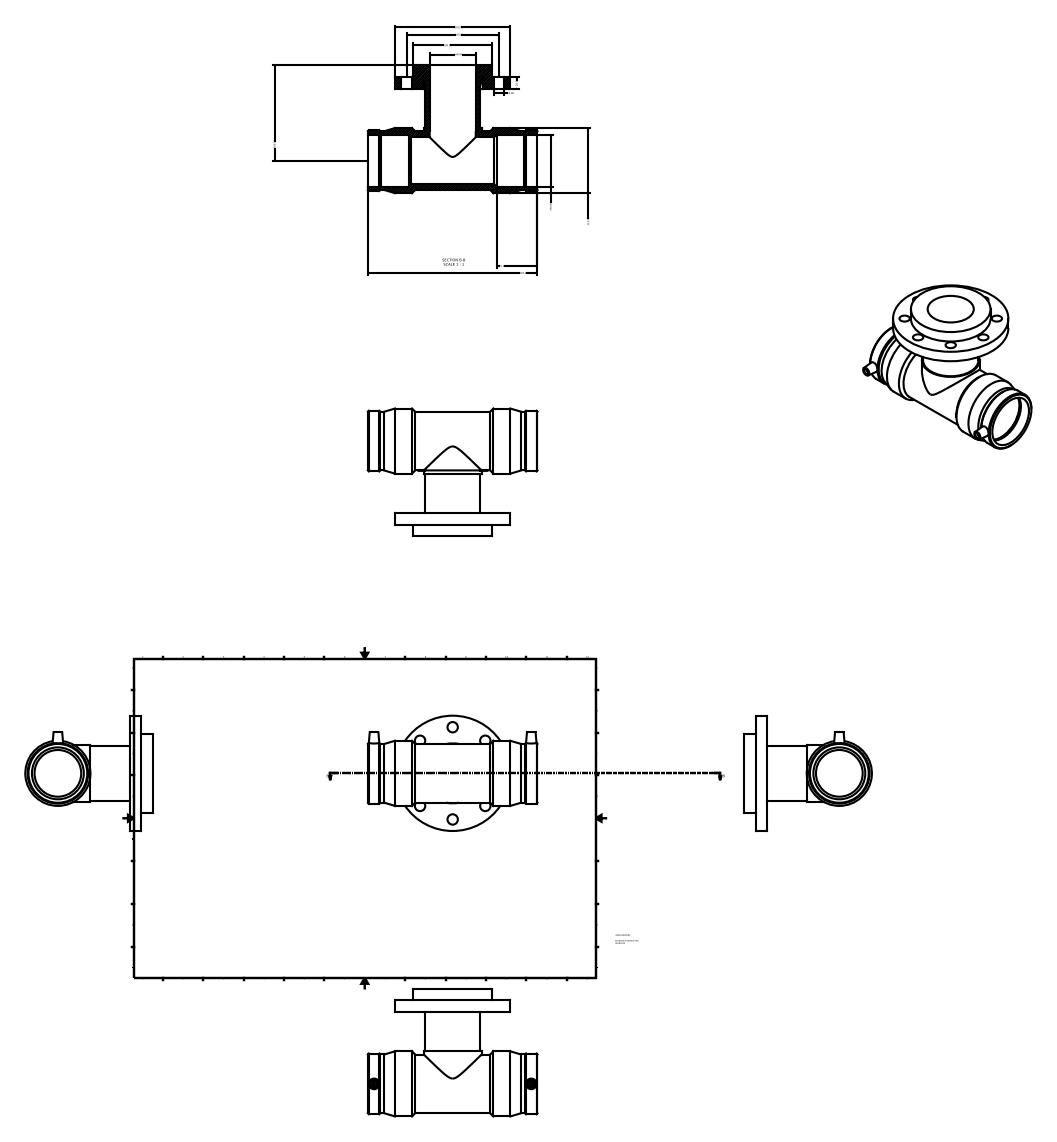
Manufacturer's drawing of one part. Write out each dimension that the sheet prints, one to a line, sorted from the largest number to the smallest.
294.00
200.00
165.00
160.00
138.00
113.00
n90.00
n80.00
71.00
20.00
18.00
